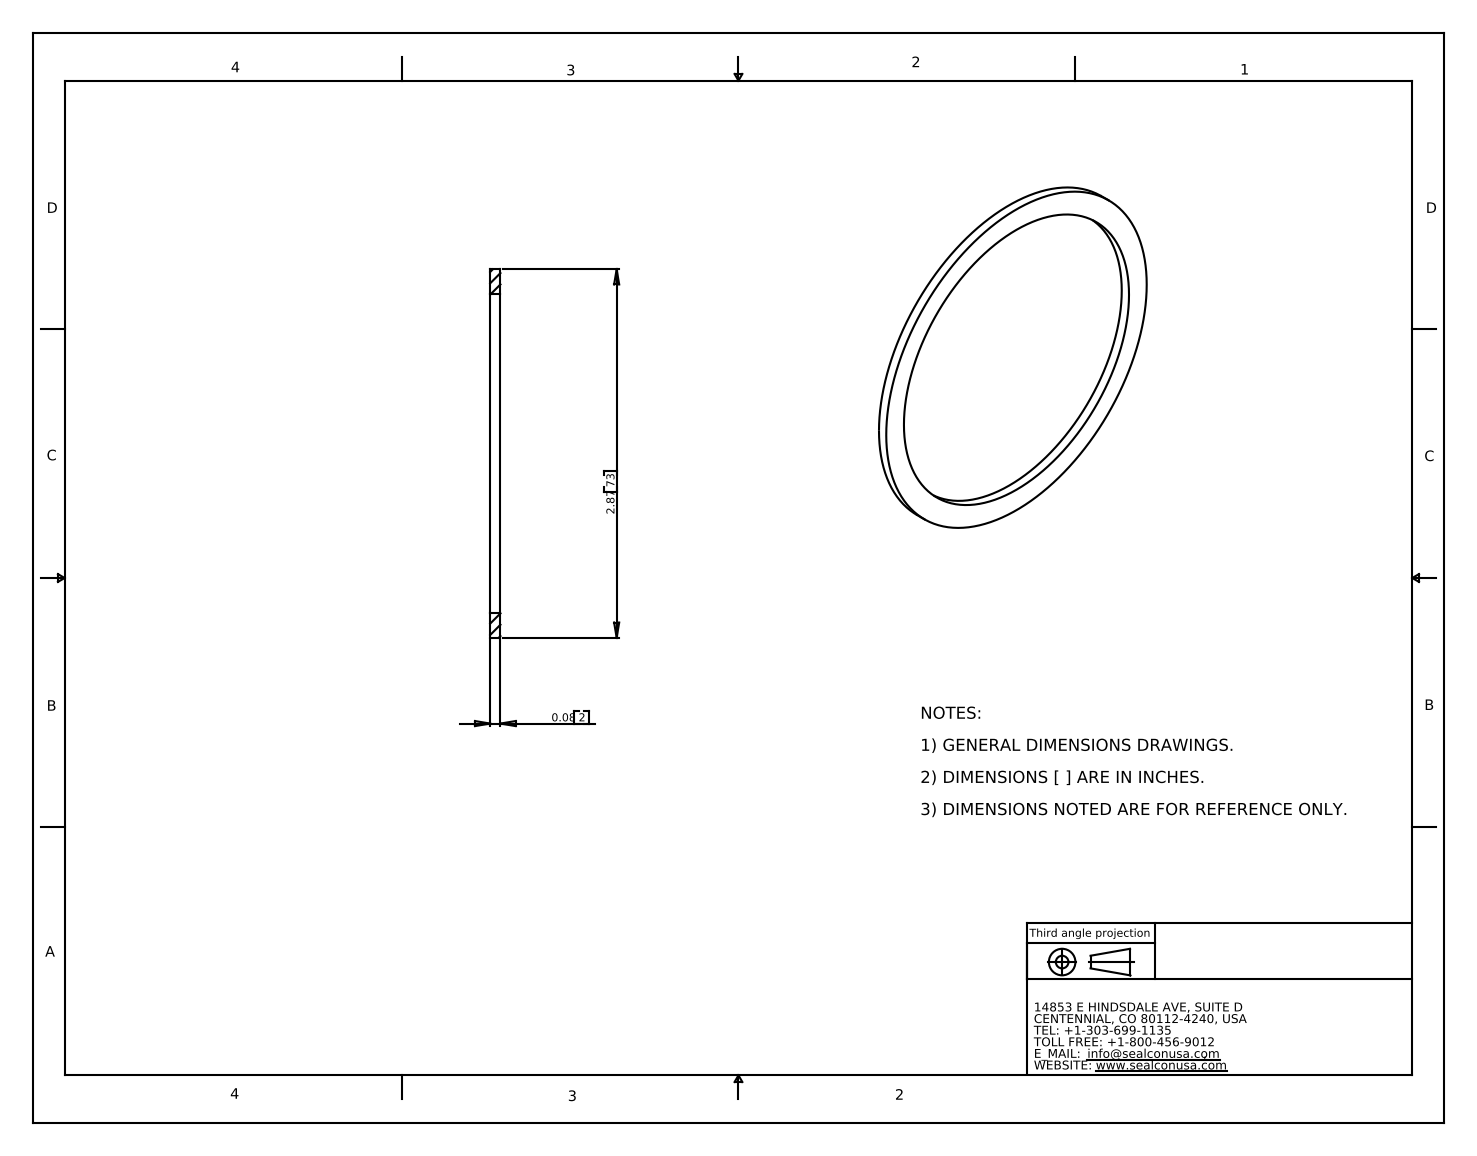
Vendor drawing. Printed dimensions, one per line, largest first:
2.87 73
0.08 2
